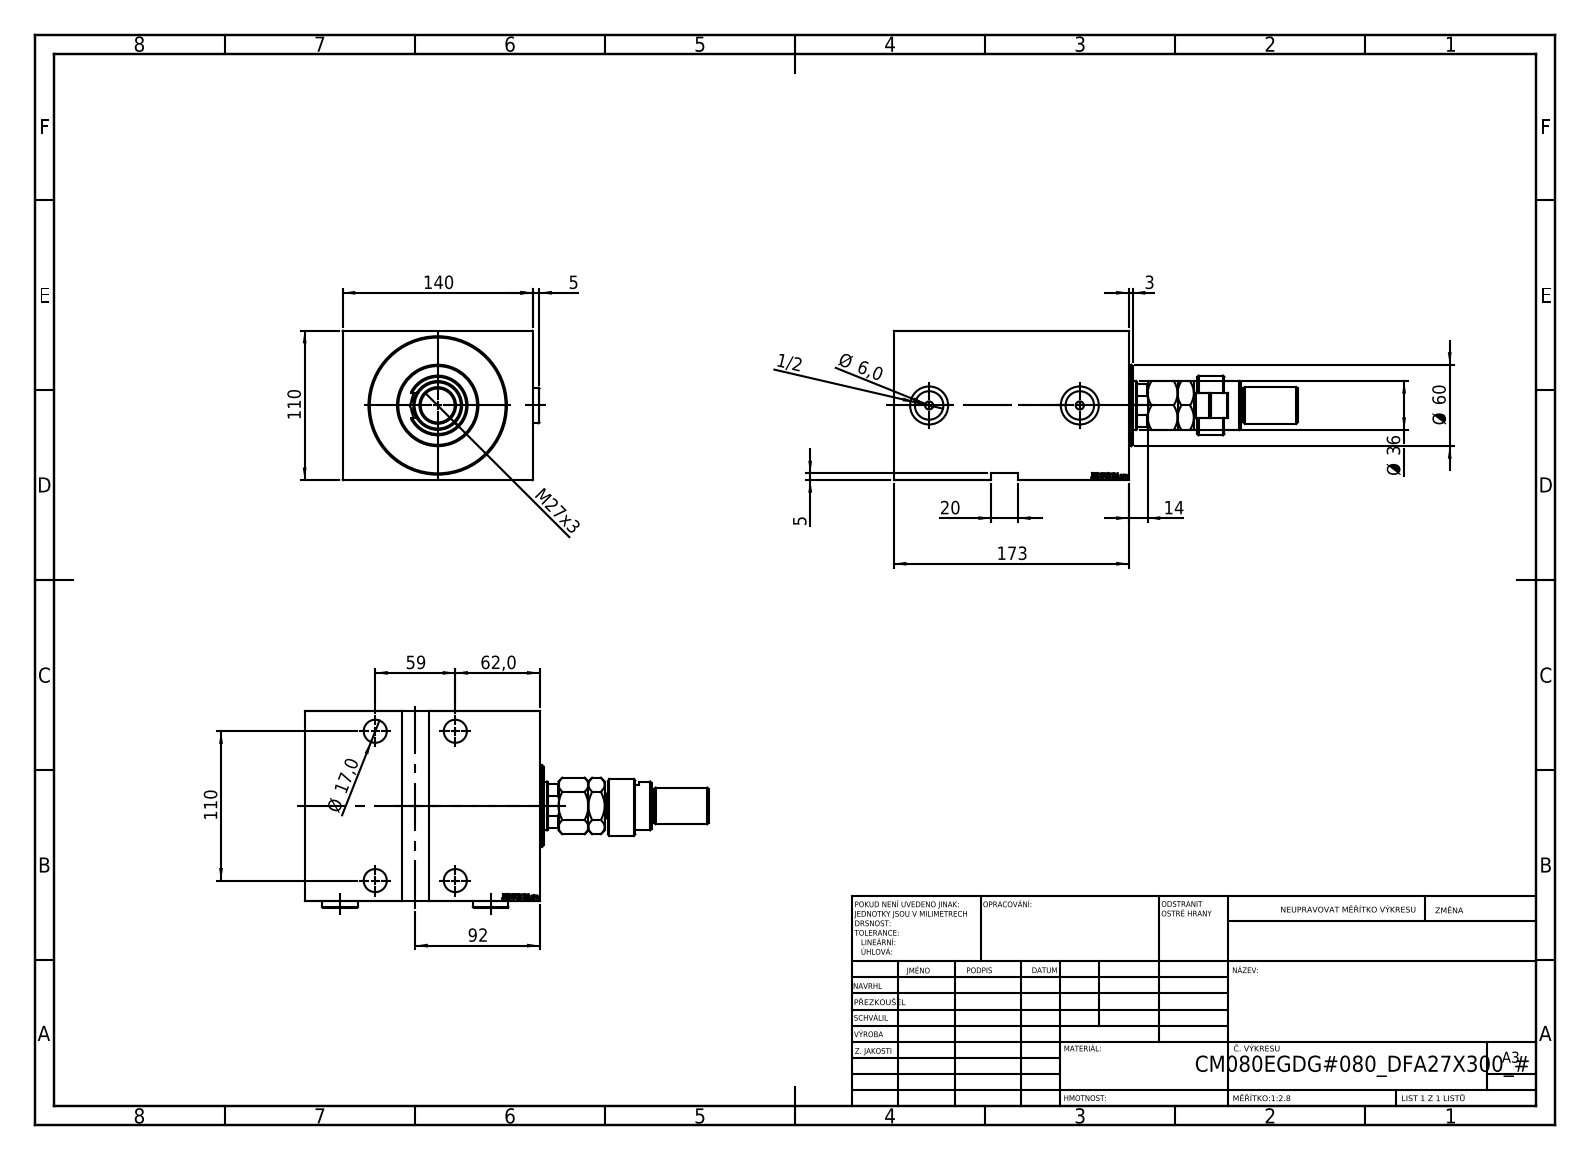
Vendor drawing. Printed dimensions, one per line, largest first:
173
140
110
110
92
62,0
Ø 60
59
Ø 36
M27x3
20
Ø 17,0
14
Ø 6,0
5
5
3
1/2
